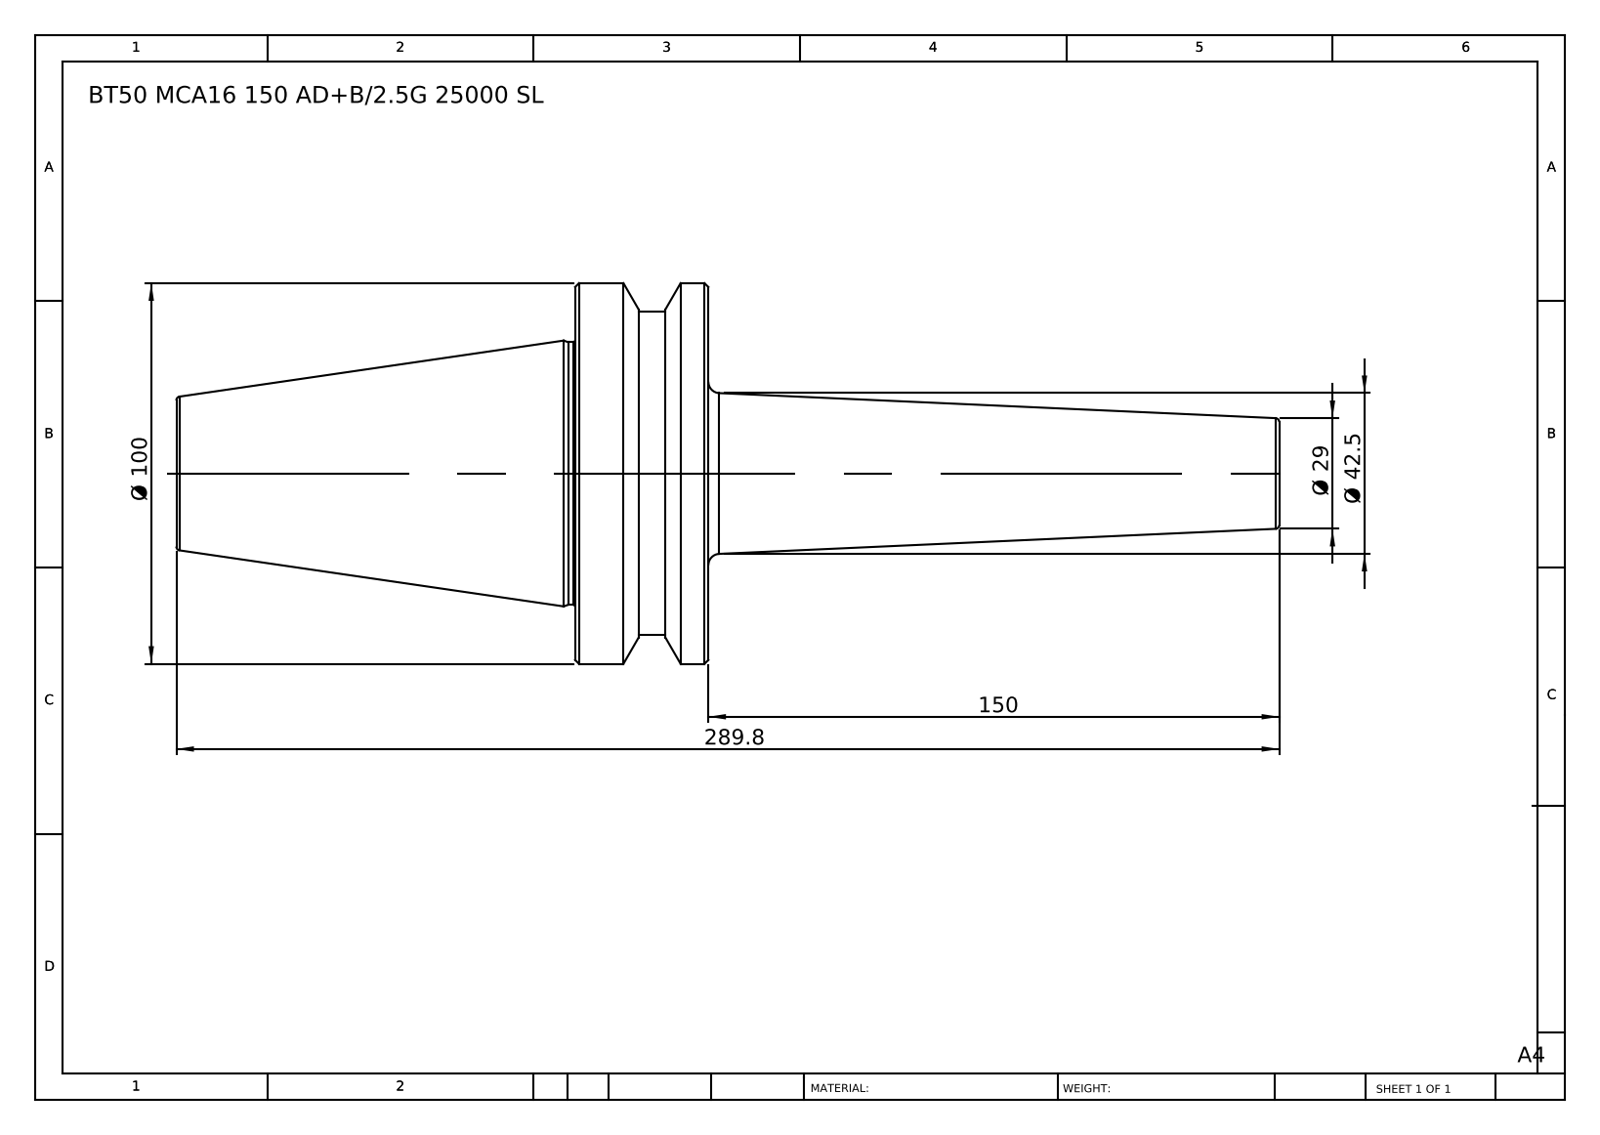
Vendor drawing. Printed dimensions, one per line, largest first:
289.8
150
Ø 100
Ø 42.5
Ø 29
